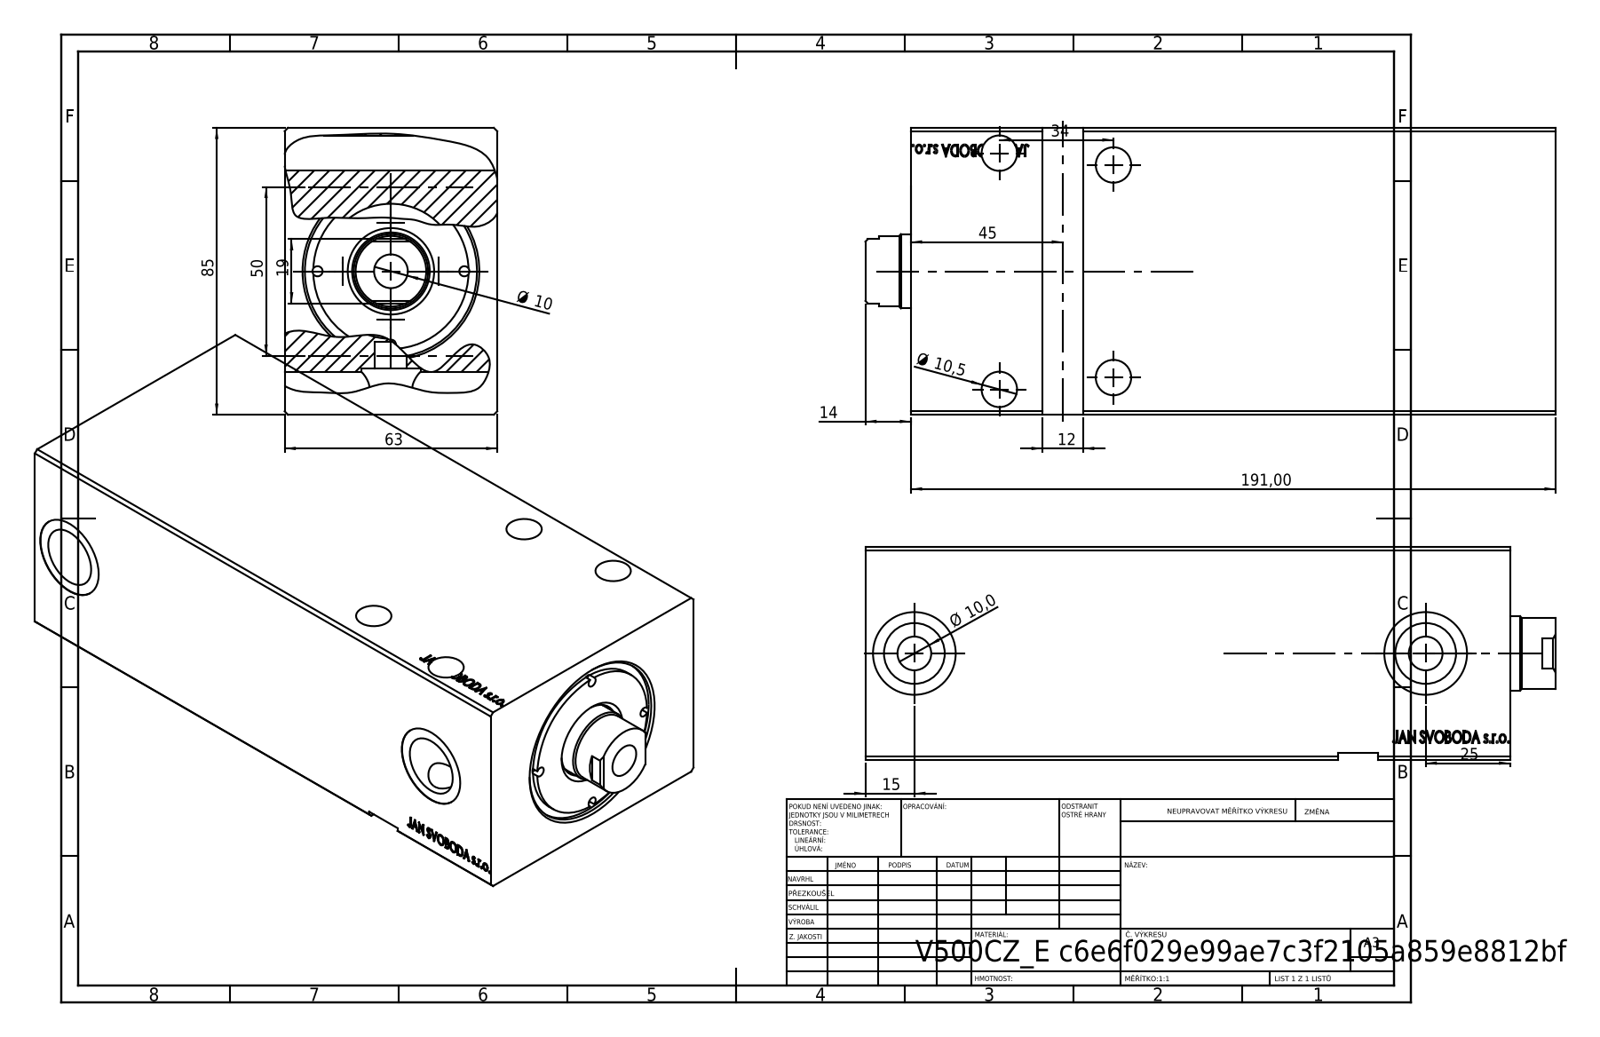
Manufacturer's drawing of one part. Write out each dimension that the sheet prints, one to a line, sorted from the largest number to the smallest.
191,00
85
63
50
45
34
25
19
15
14
12
Ø 10,5
Ø 10
Ø 10,0
